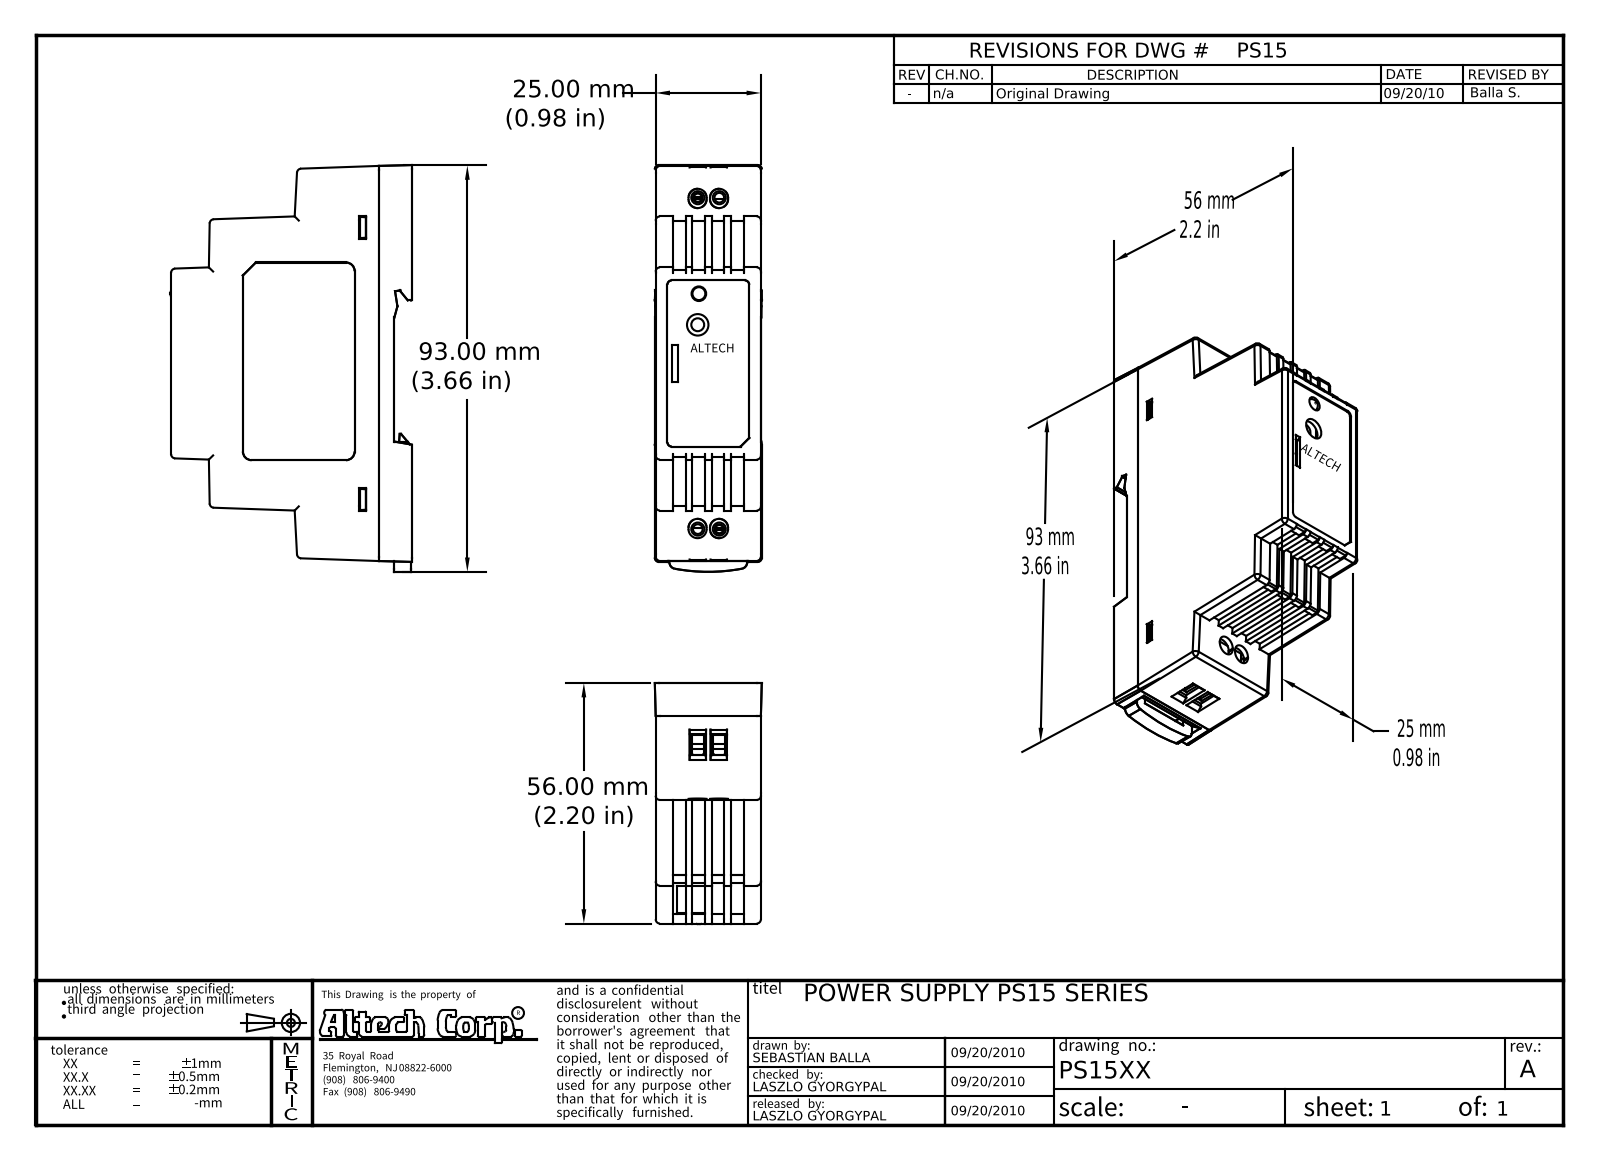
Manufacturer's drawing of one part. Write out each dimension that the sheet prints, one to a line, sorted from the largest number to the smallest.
93.00 mm (3.66 in)
93 mm 3.66 in
56.00 mm (2.20 in)
56 mm 2.2 in
25.00 mm (0.98 in)
25 mm 0.98 in
